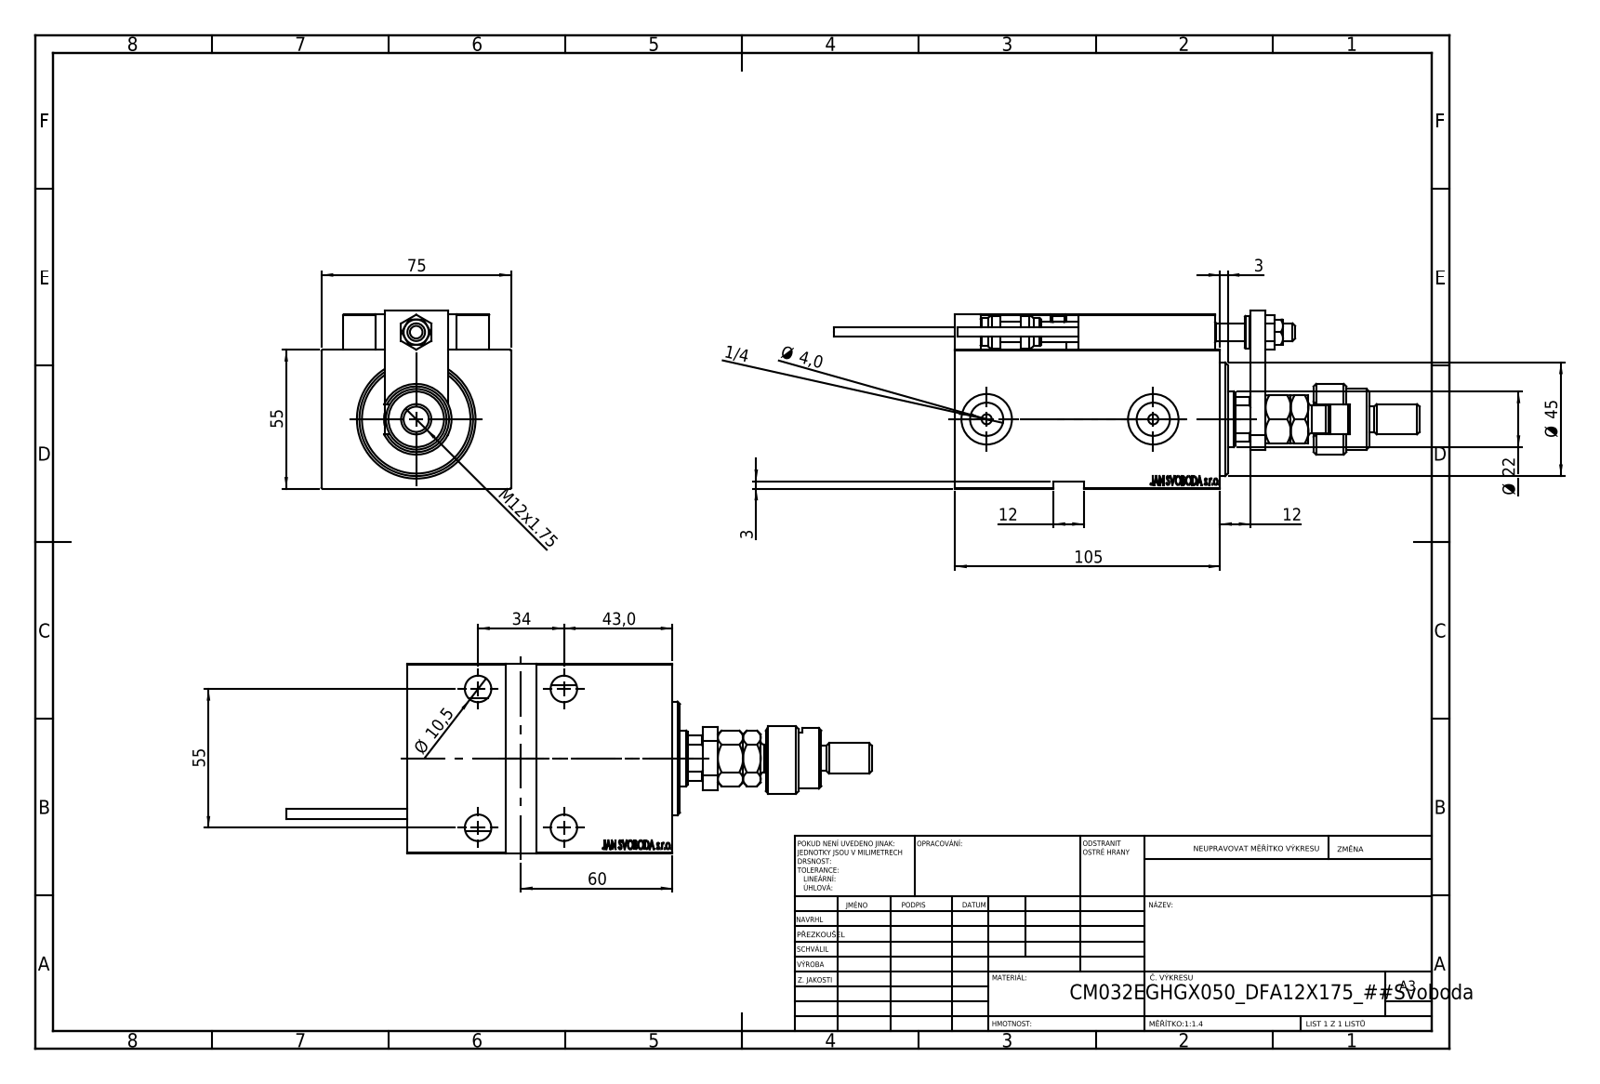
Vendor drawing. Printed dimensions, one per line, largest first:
105
75
60
55
55
Ø 45
43,0
34
Ø 22
M12x1.75
12
12
Ø 10,5
Ø 4,0
3
3
1/4
